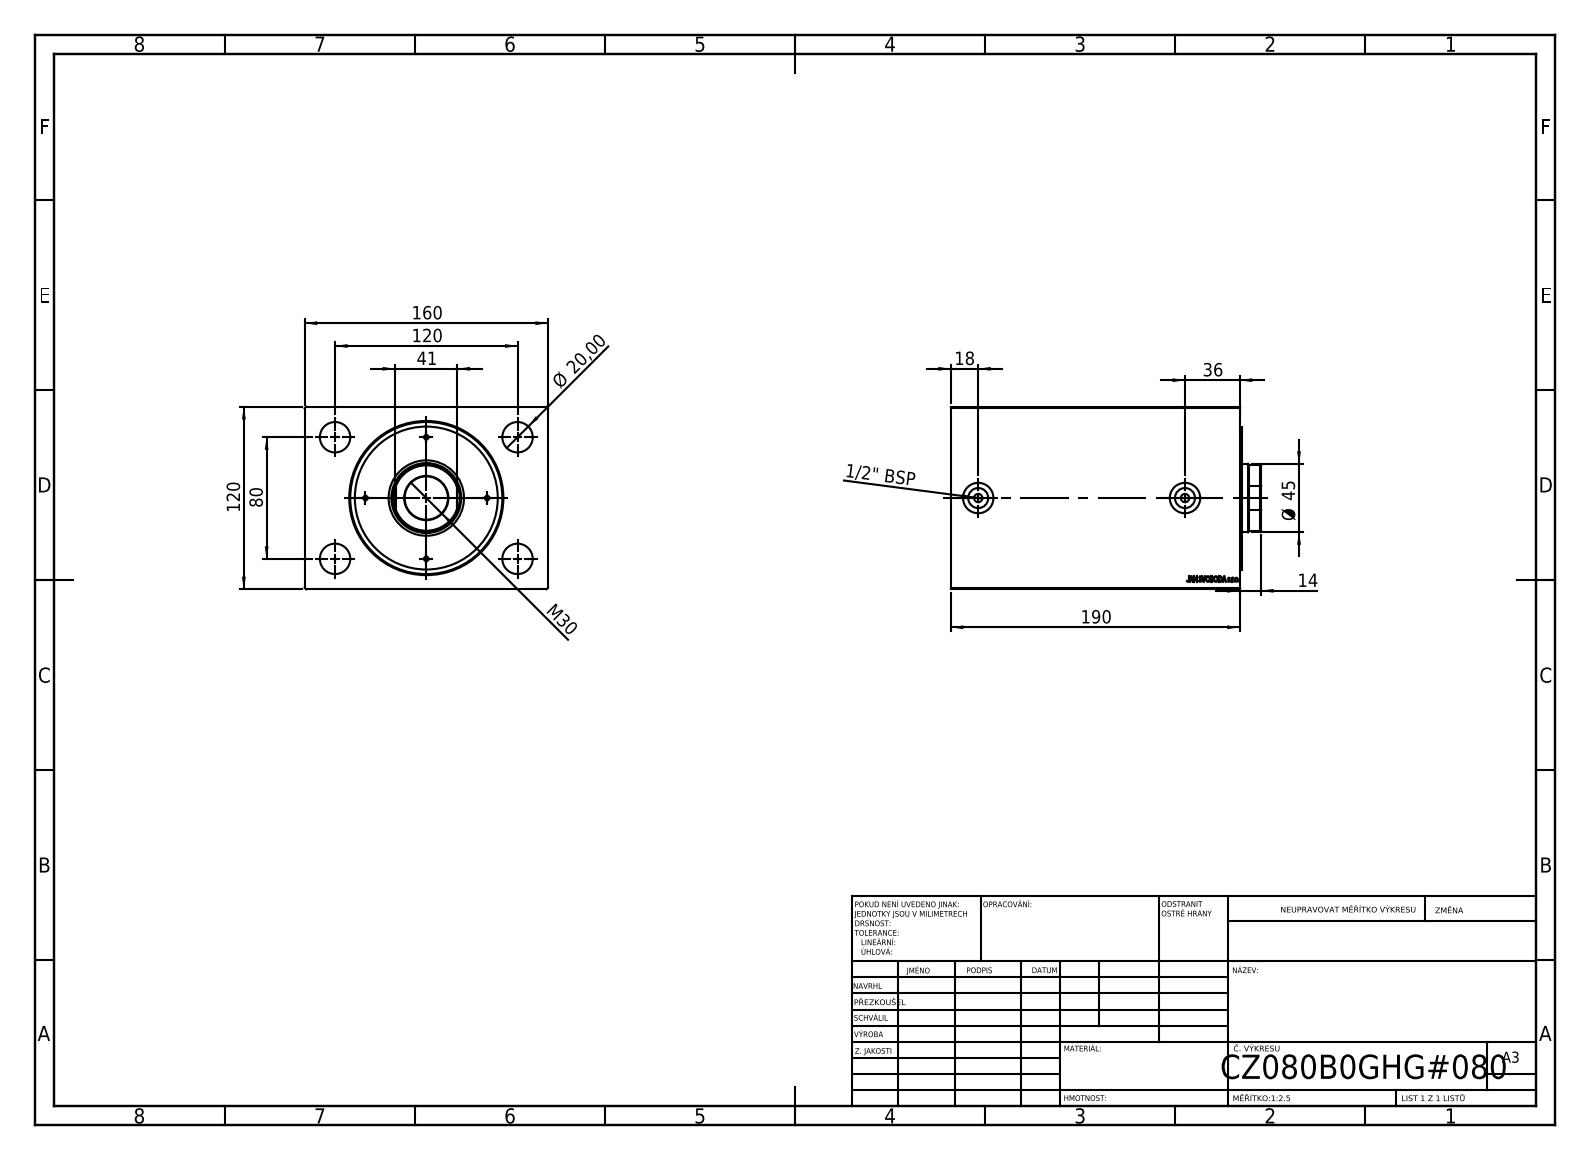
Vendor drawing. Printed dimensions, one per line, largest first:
190
160
120
120
80
Ø 45
41
36
M30
Ø 20,00
18
14
1/2" BSP
